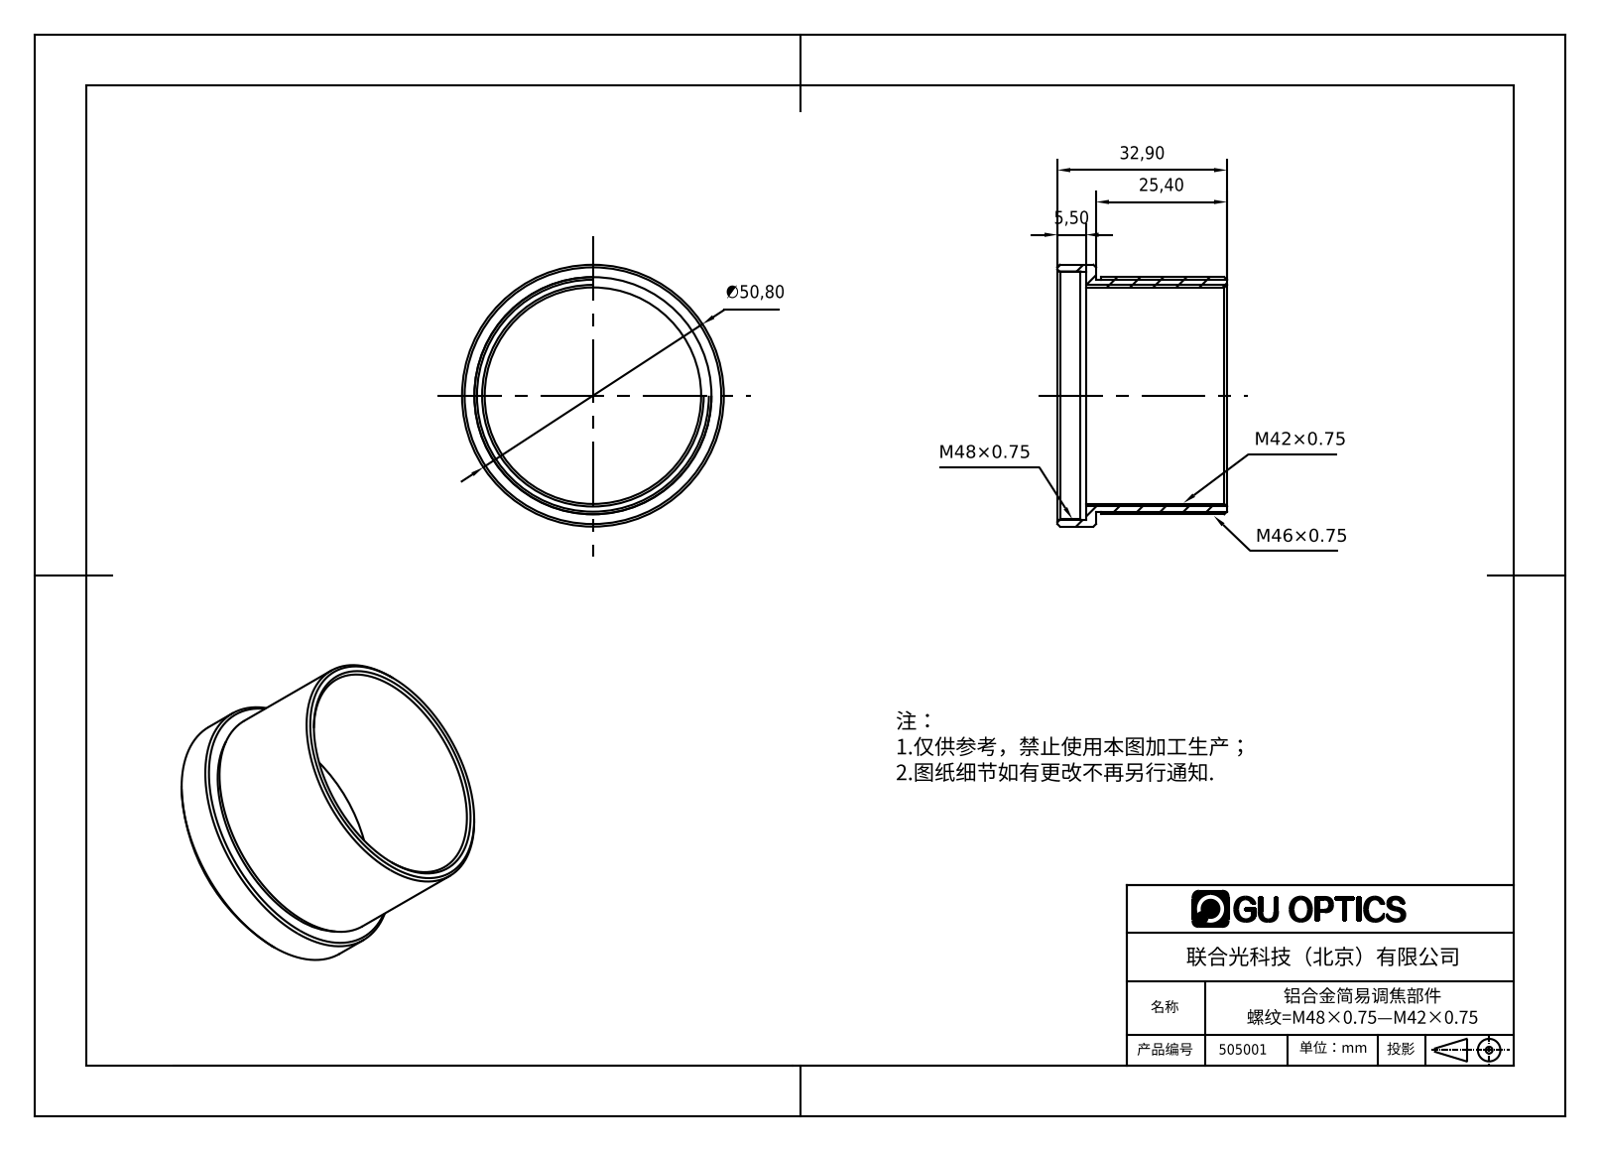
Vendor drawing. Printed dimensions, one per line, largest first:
∅50,80
32,90
25,40
5,50
